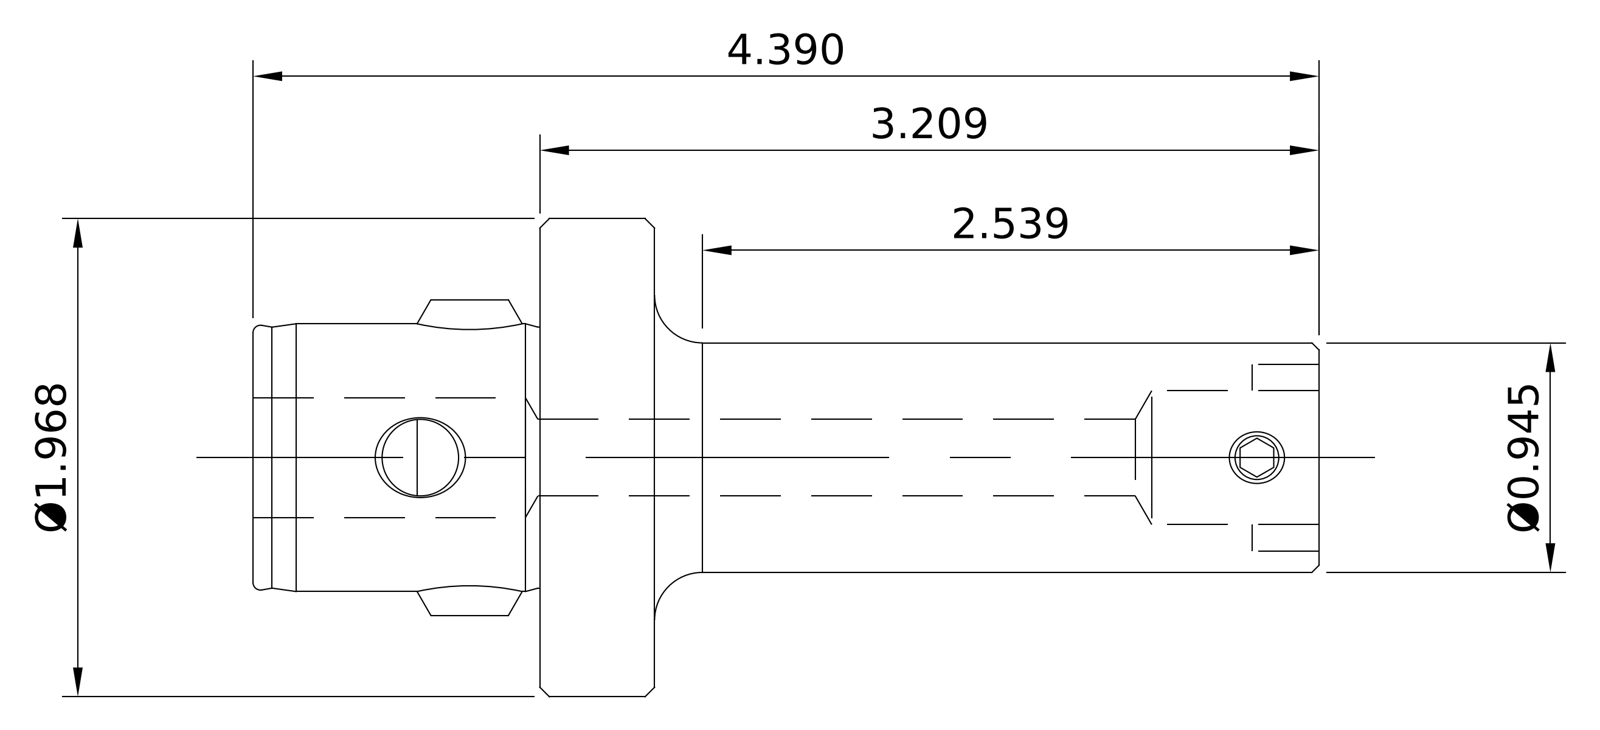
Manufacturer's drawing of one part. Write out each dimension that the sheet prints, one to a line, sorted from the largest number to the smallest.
4.390
3.209
2.539
Ø1.968
Ø0.945
